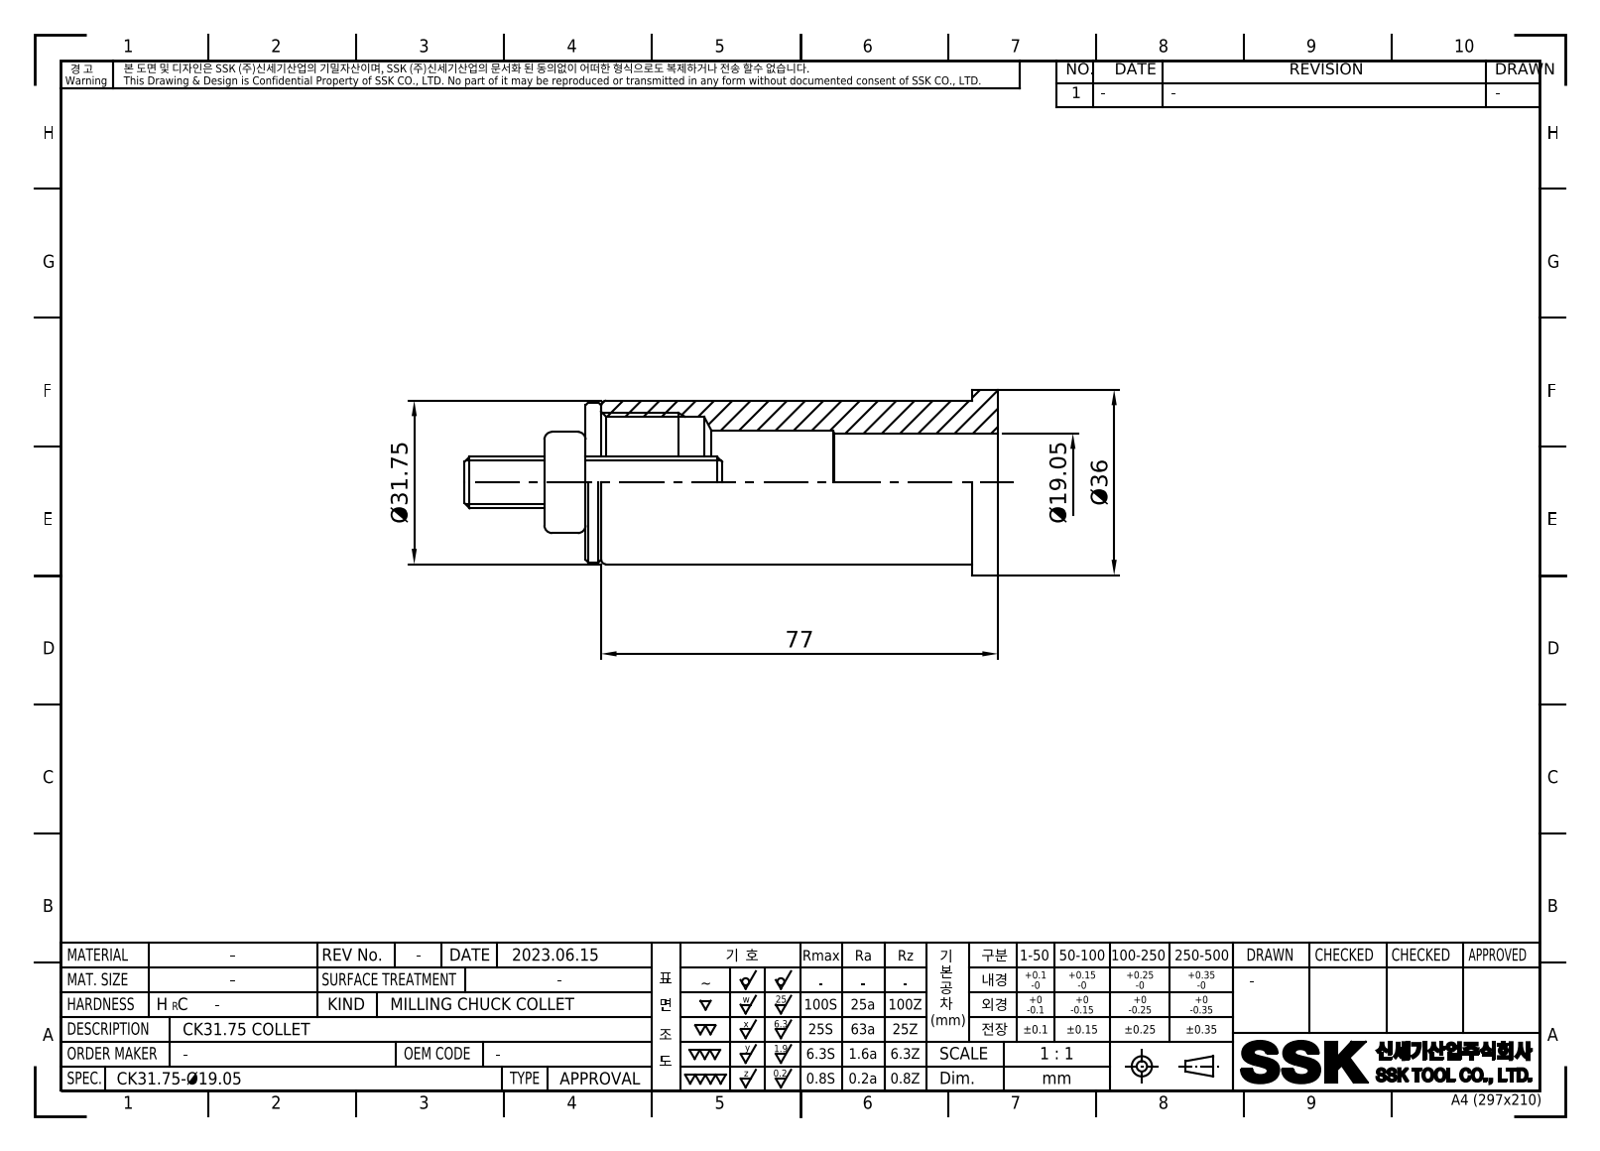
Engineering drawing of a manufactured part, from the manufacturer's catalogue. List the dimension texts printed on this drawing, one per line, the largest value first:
77
Ø36
Ø31.75
Ø19.05
